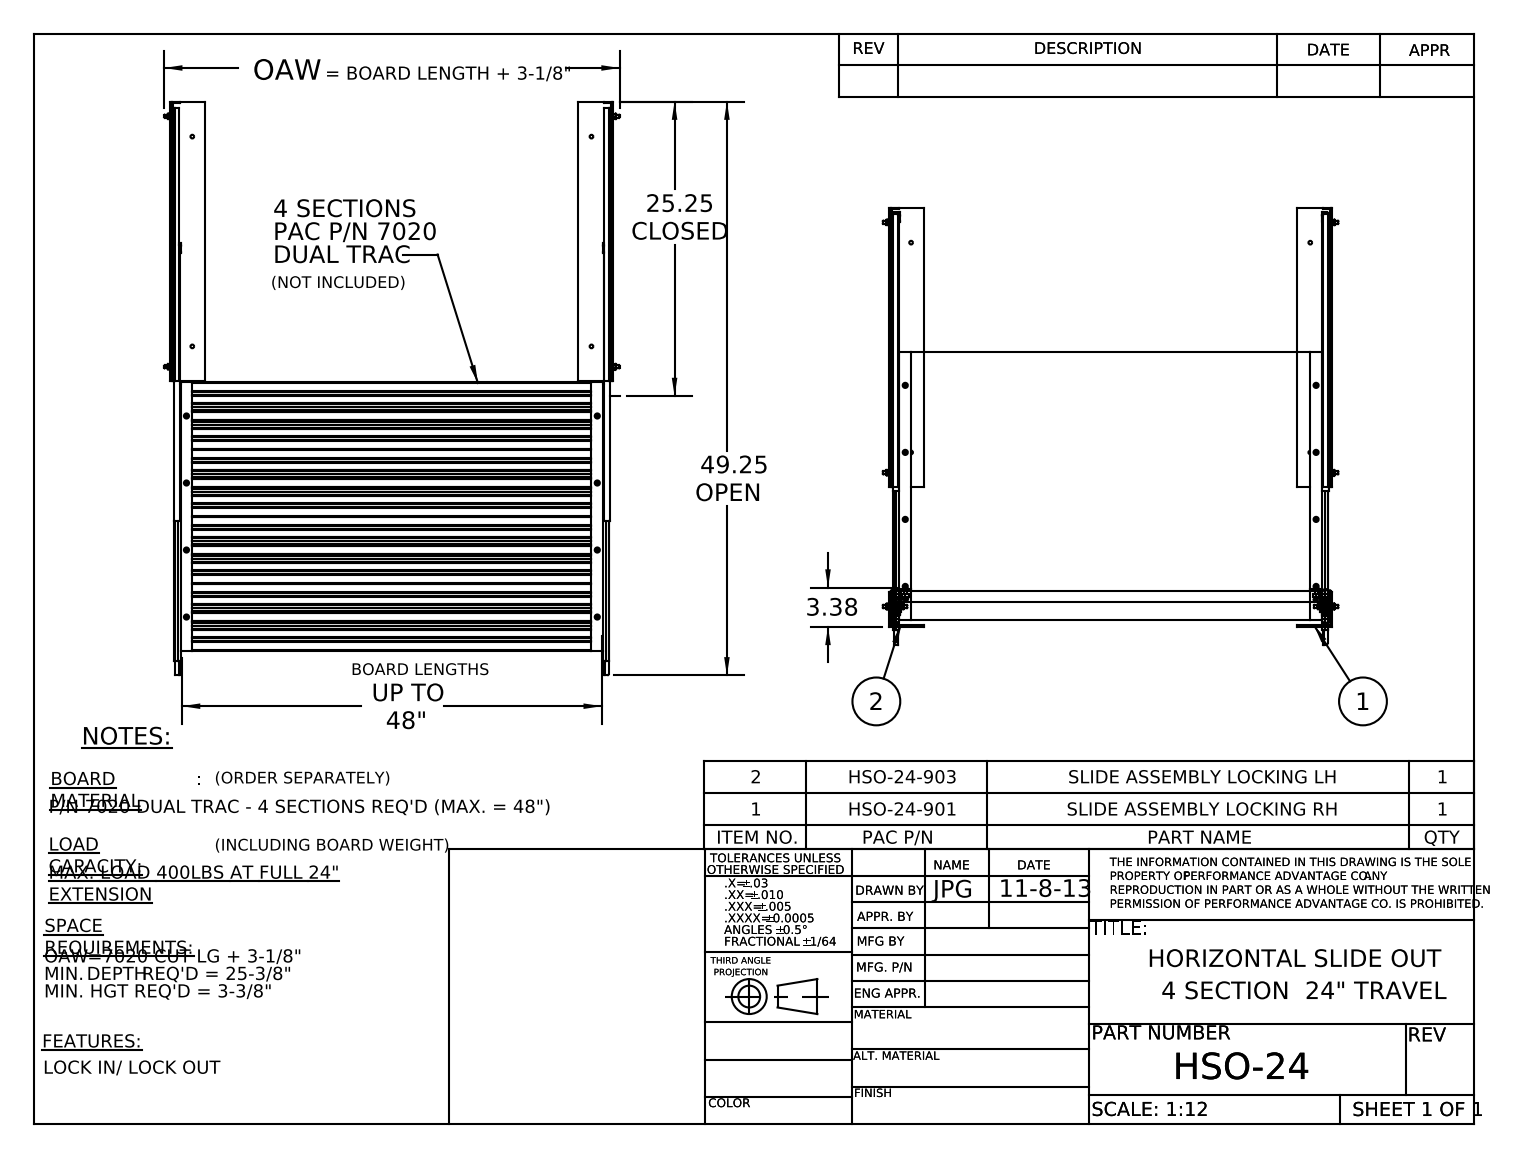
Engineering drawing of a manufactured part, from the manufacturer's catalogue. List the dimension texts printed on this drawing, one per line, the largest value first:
OPEN 49.25
48" UP TO
25.25 CLOSED
3.38
